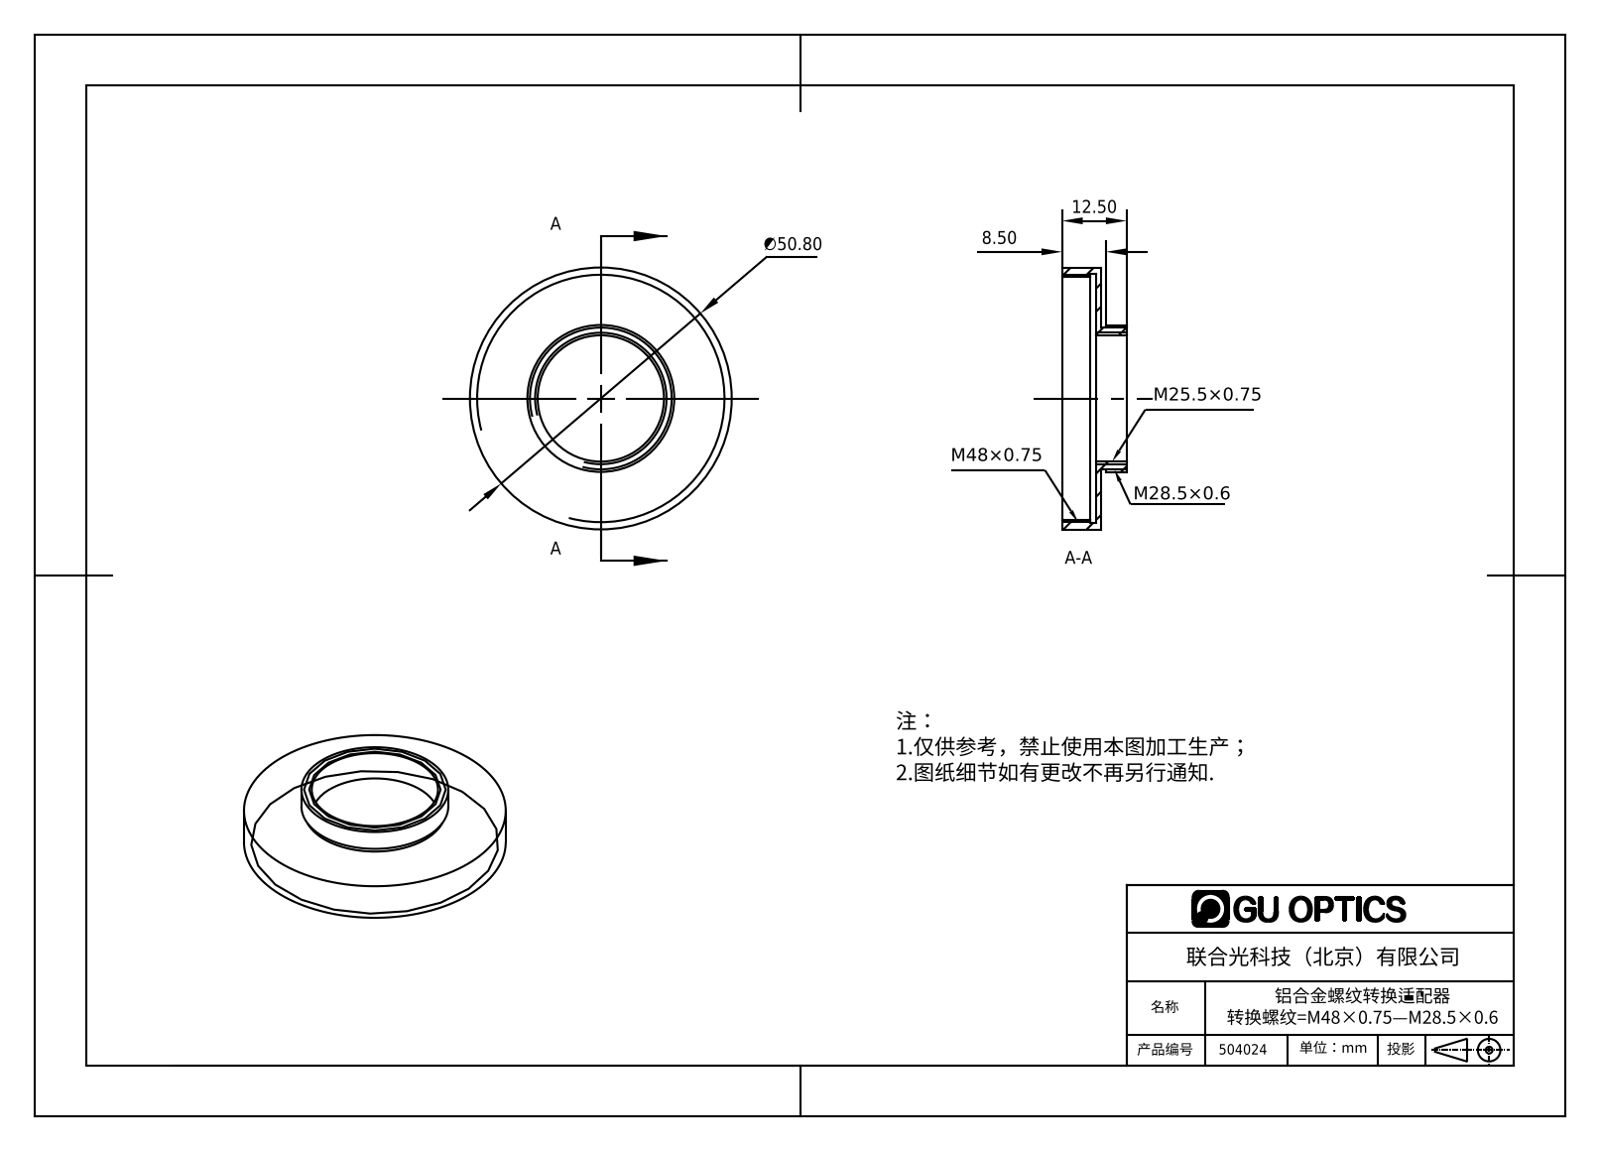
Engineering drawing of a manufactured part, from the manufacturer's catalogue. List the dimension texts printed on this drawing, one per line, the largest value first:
∅50.80
12.50
8.50
